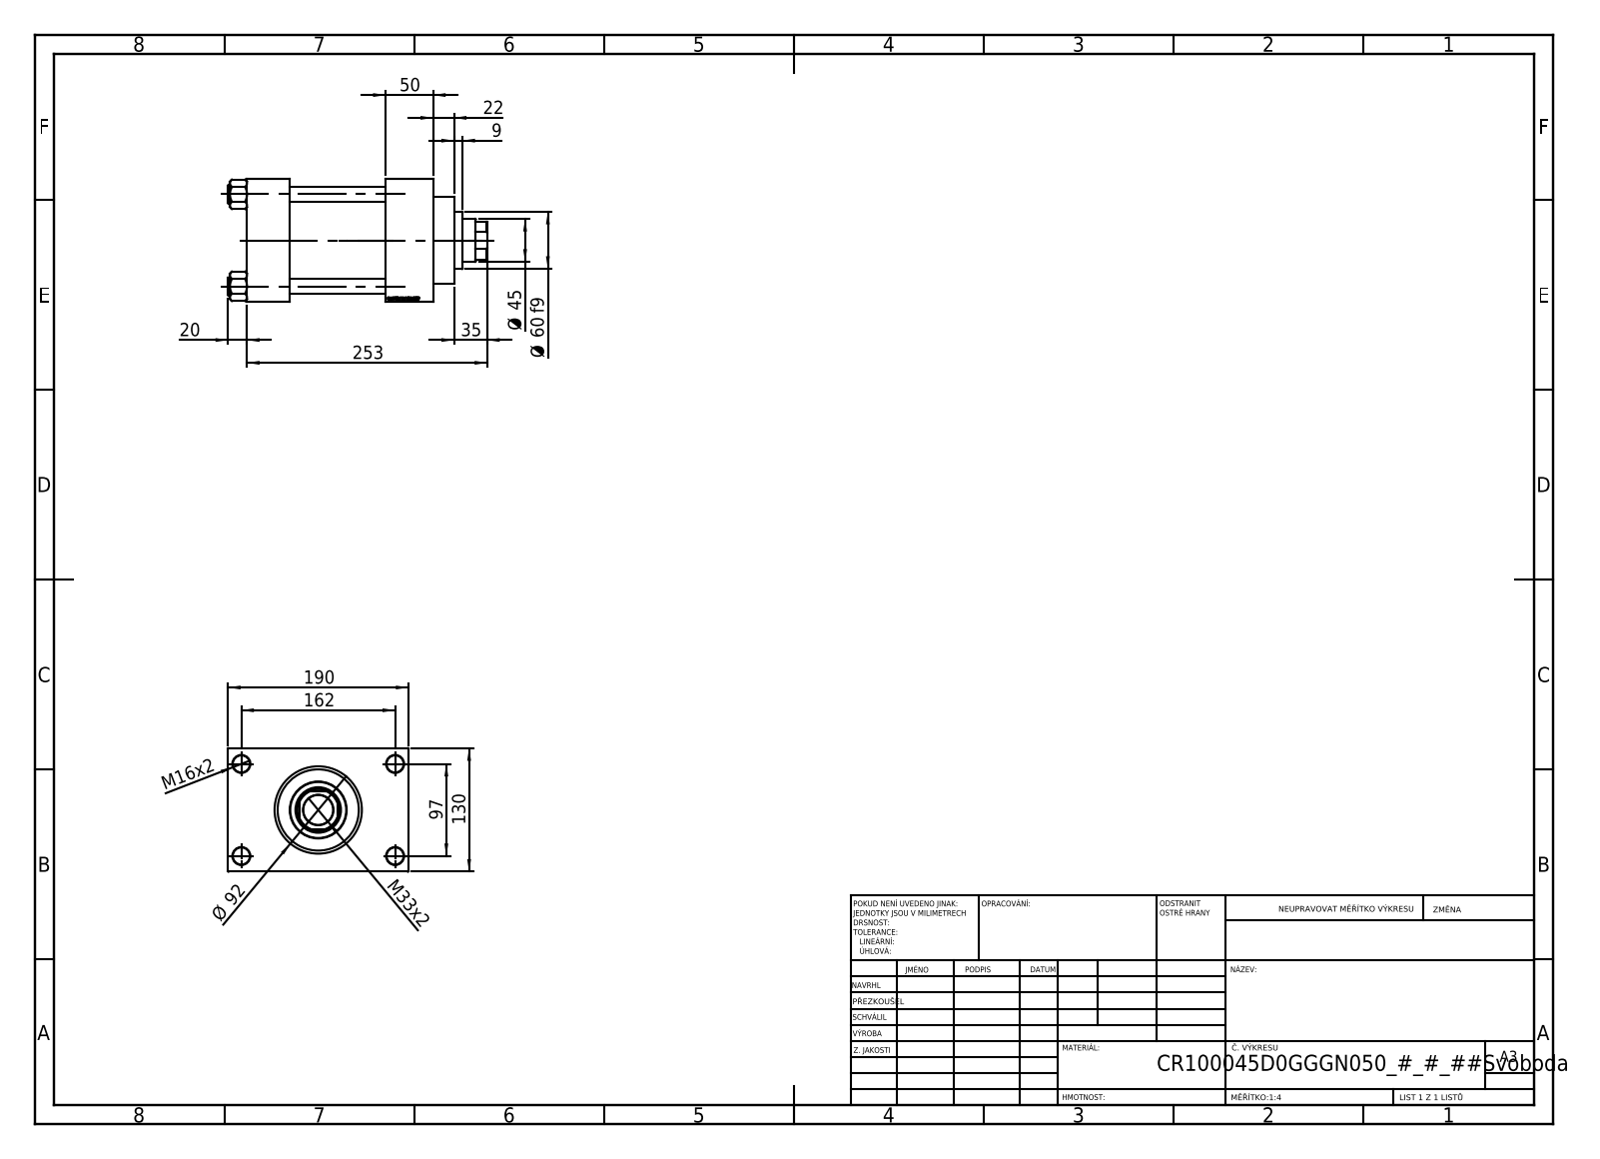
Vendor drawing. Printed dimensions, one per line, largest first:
253
190
162
130
97
Ø 92
Ø 60 f9
50
Ø 45
35
M33x2
22
20
M16x2
9
